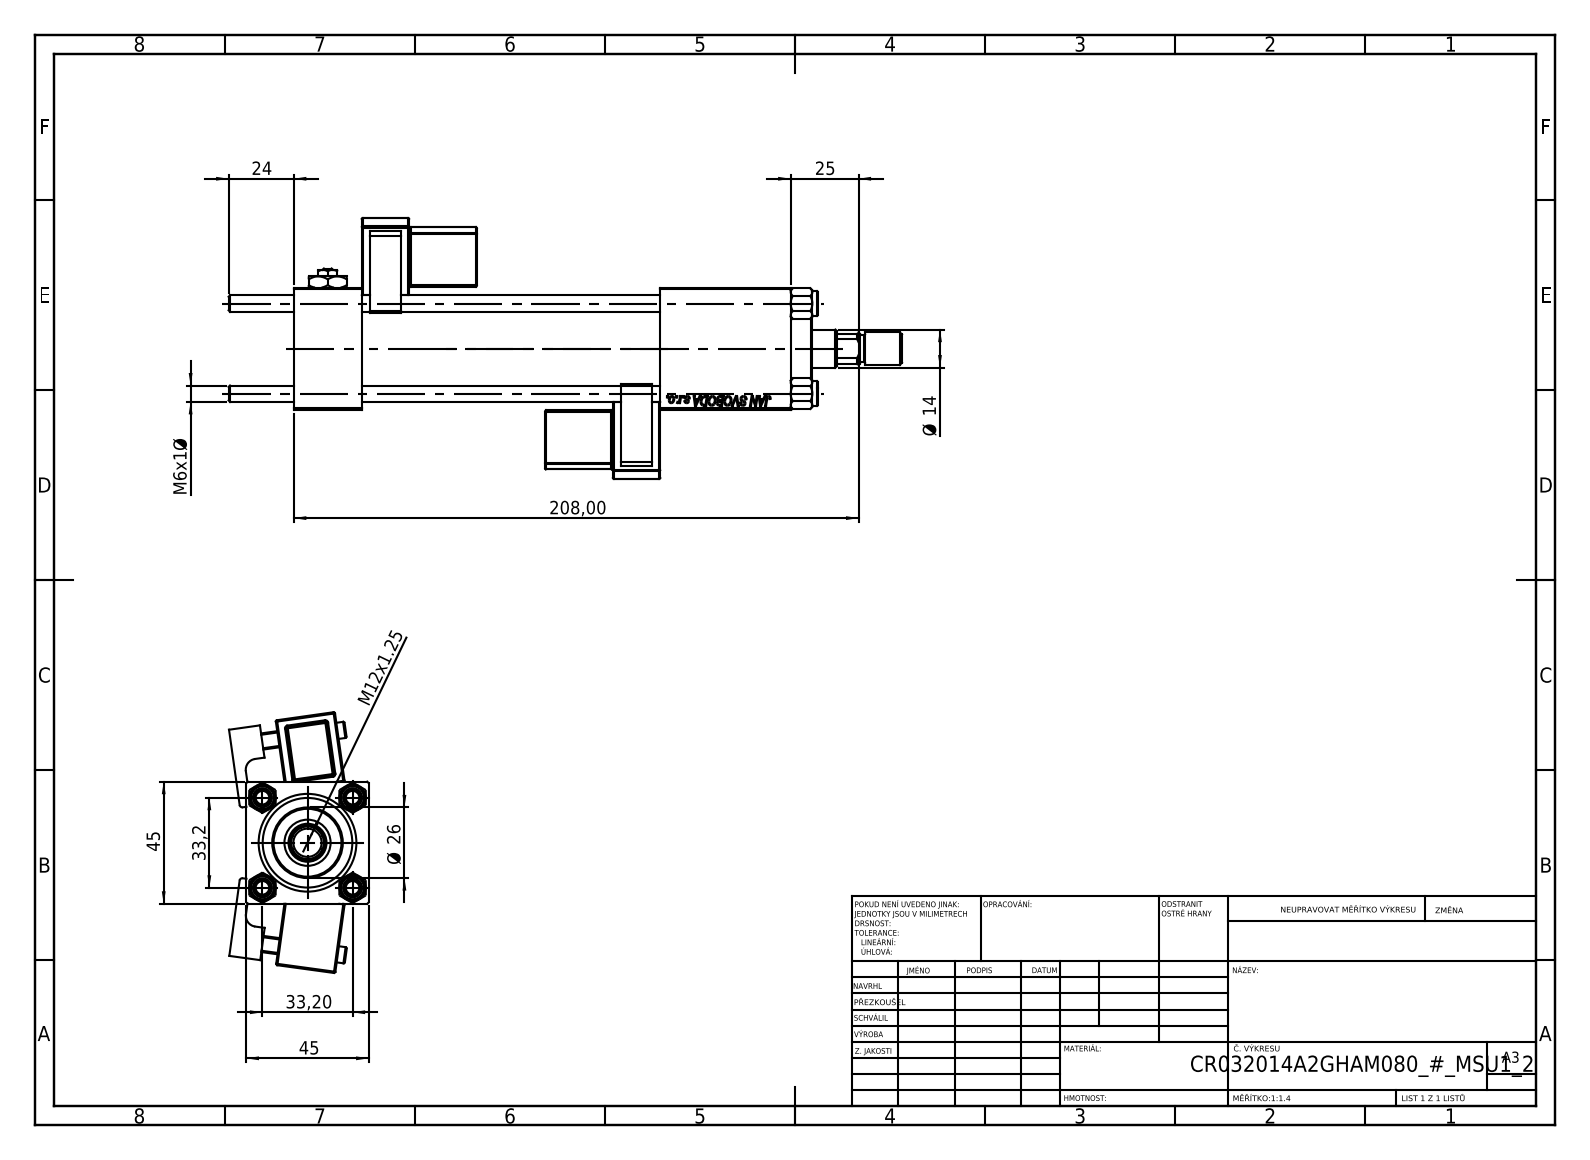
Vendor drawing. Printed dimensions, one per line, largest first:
208,00
45
45
33,2
33,20
Ø 26
25
24
Ø 14
M12x1.25
M6x1 Ø
